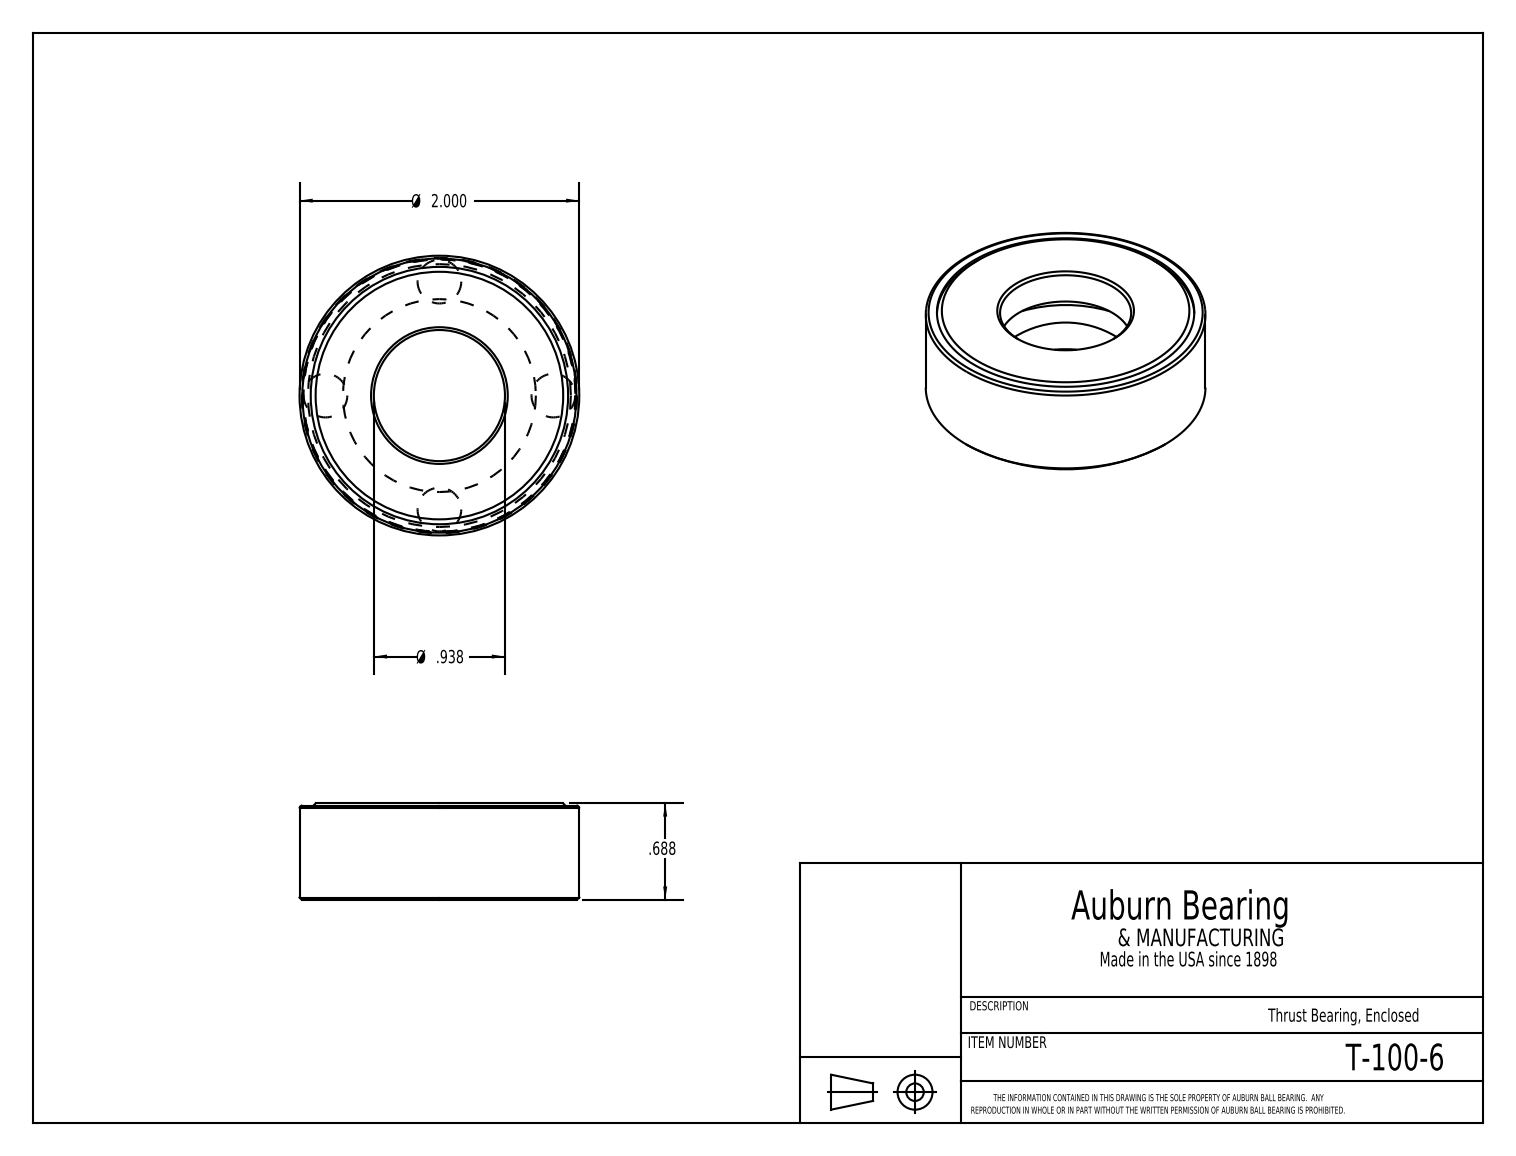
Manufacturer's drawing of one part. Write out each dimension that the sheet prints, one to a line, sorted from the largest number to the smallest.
Ø 2.000
Ø .938
.688
